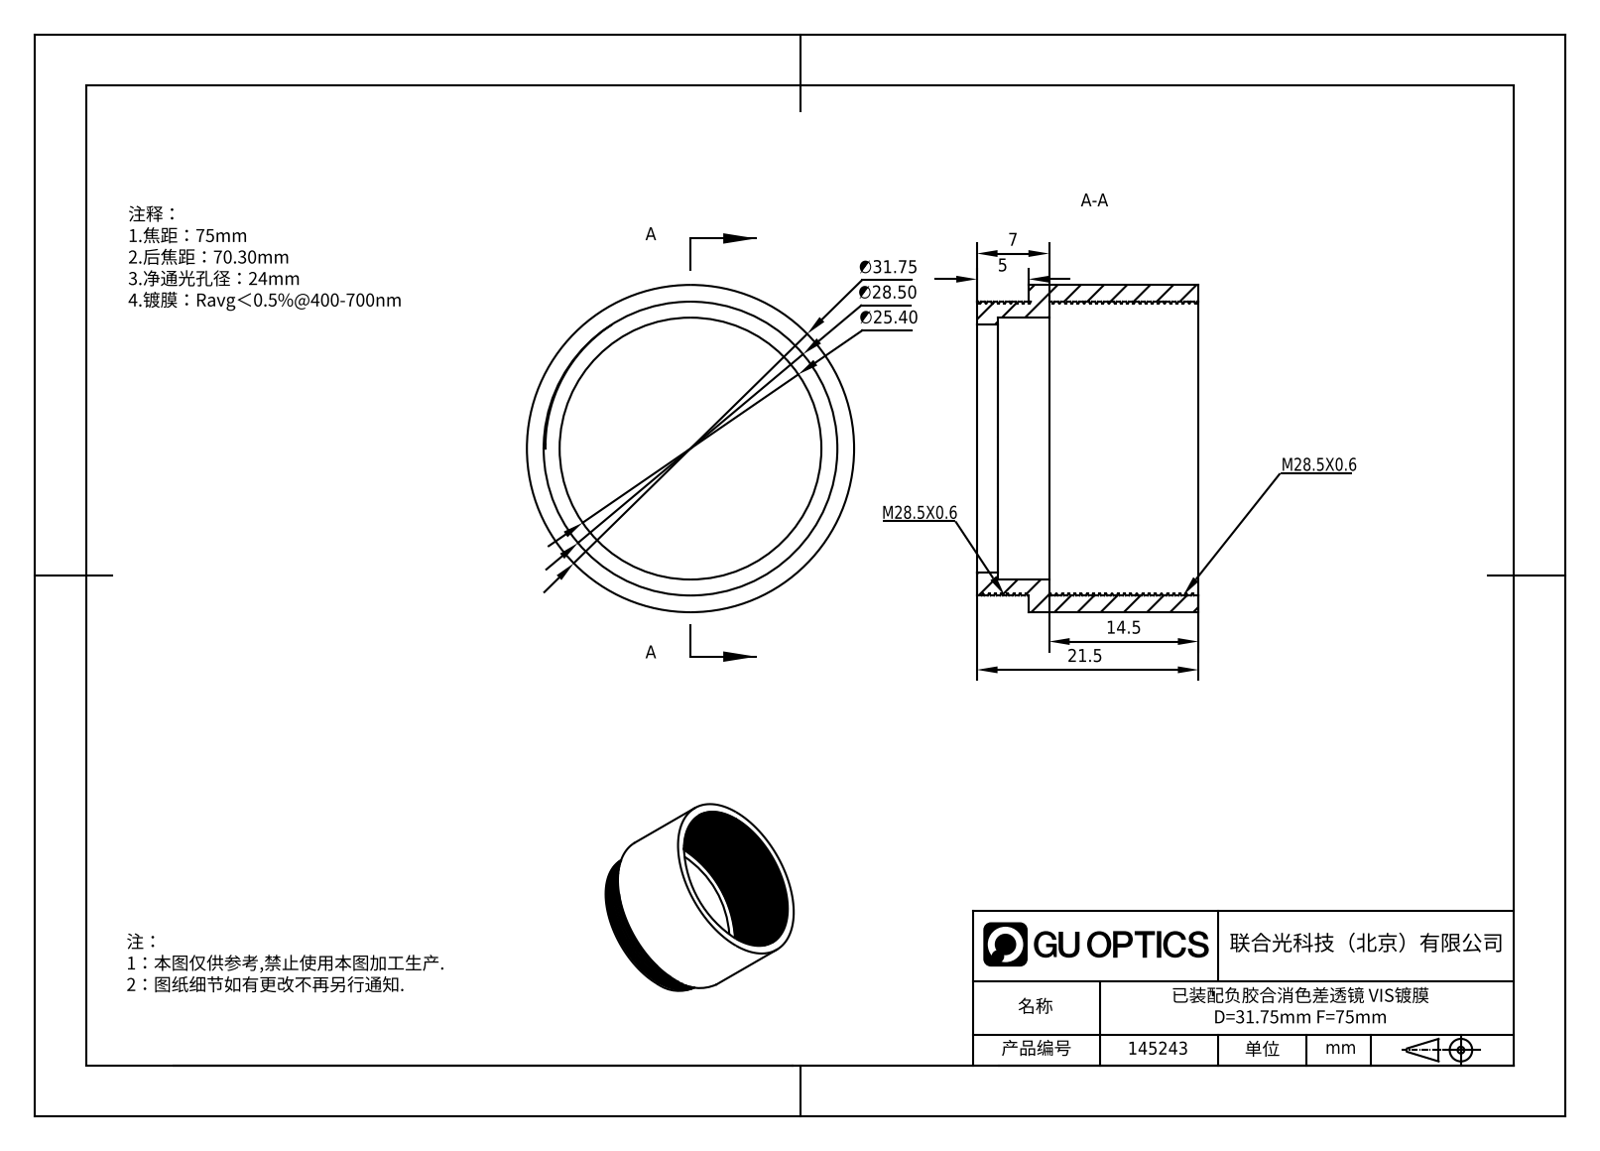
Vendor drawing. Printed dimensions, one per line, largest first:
∅31.75
∅28.50
∅25.40
21.5
14.5
7
5
